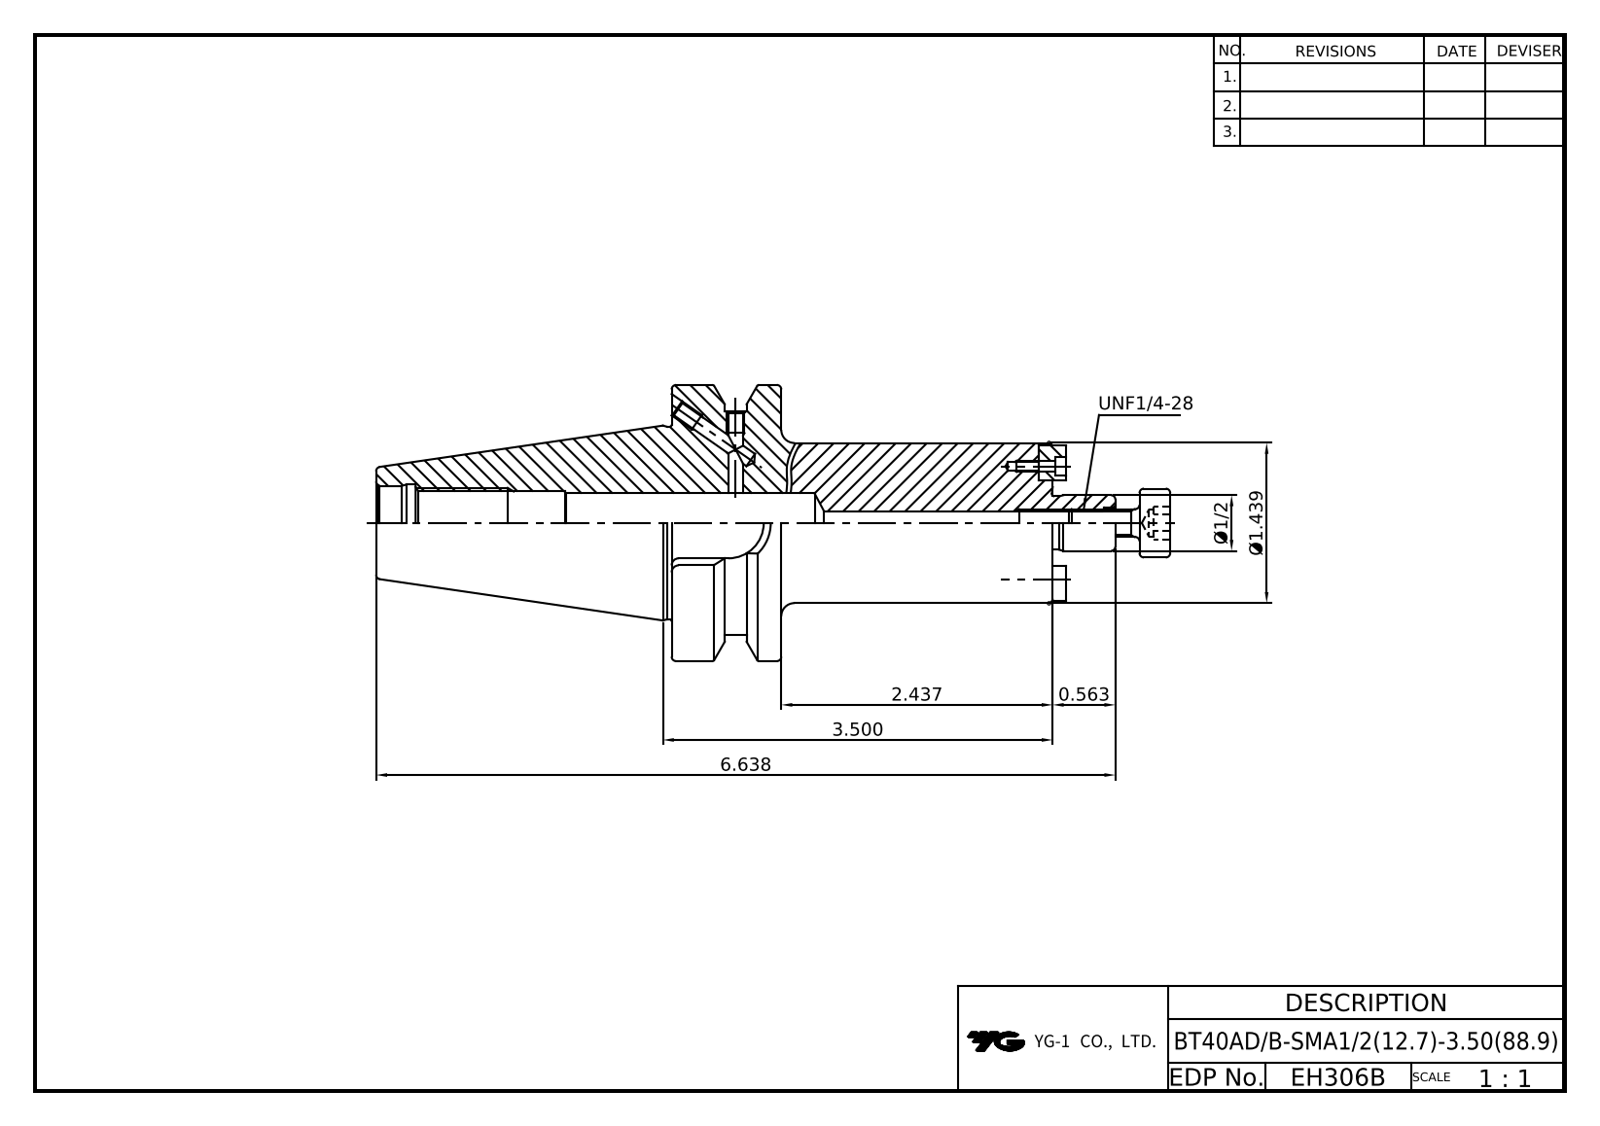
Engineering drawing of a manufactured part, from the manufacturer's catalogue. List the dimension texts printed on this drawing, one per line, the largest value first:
6.638
3.500
2.437
Ø1.439
0.563
Ø1/2
